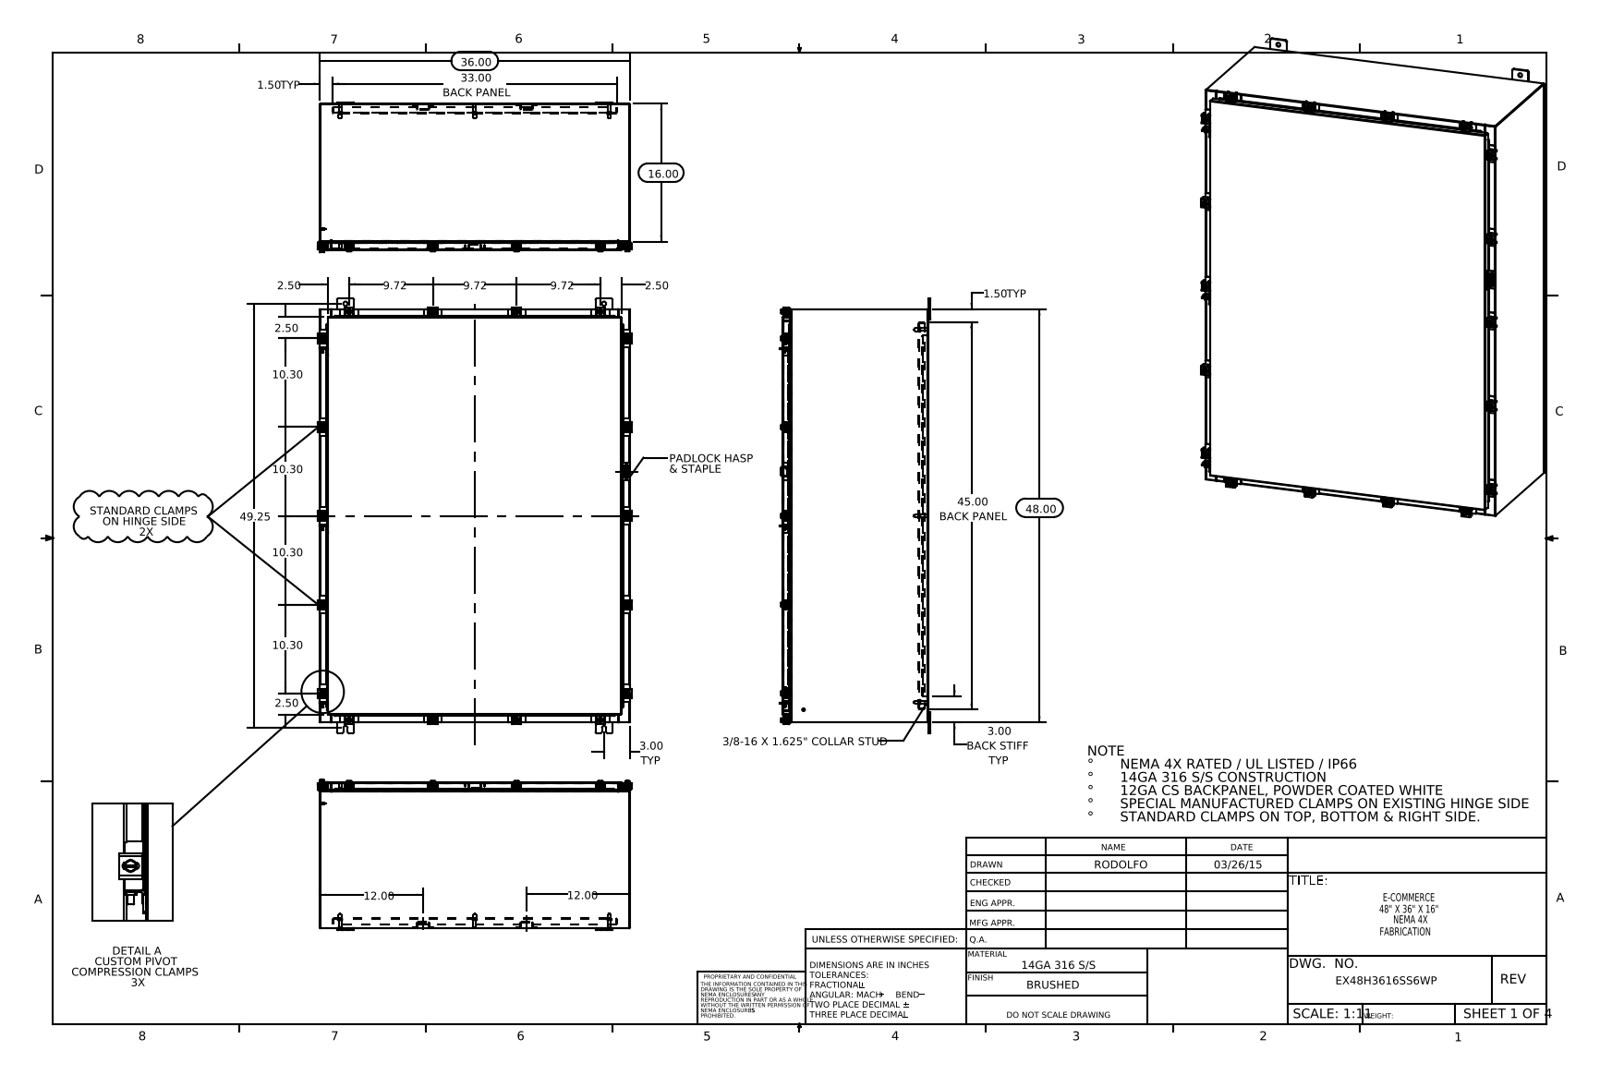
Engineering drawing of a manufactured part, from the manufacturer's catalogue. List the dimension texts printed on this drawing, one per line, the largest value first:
49.25
48.00
45.00 BACK PANEL
36.00
33.00 BACK PANEL
16.00
12.00
12.00
10.30
10.30
10.30
10.30
9.72
9.72
9.72
3.00 TYP
3.00 BACK STIFF TYP
2.50
2.50
2.50
2.50
1.50 TYP
1.50 TYP
